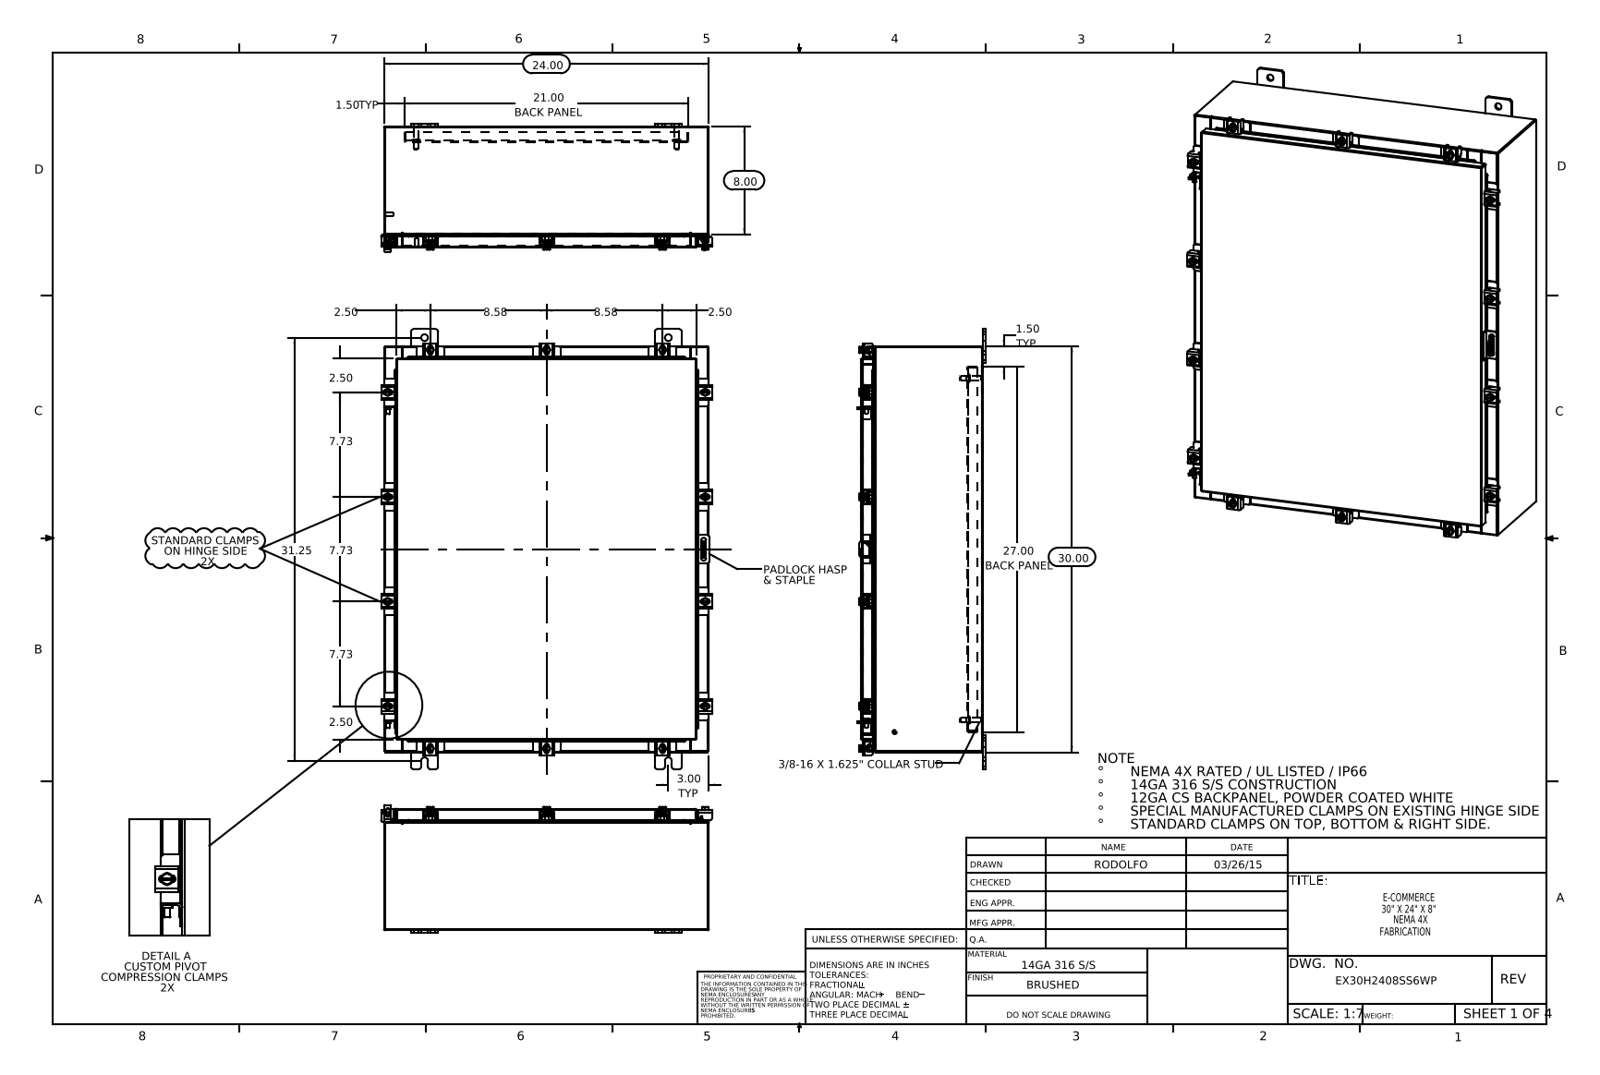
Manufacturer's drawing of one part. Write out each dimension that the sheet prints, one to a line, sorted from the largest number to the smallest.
31.25
30.00
27.00 BACK PANEL
24.00
21.00 BACK PANEL
8.58
8.58
8.00
7.73
7.73
7.73
3.00 TYP
2.50
2.50
2.50
2.50
1.50 TYP
1.50 TYP
